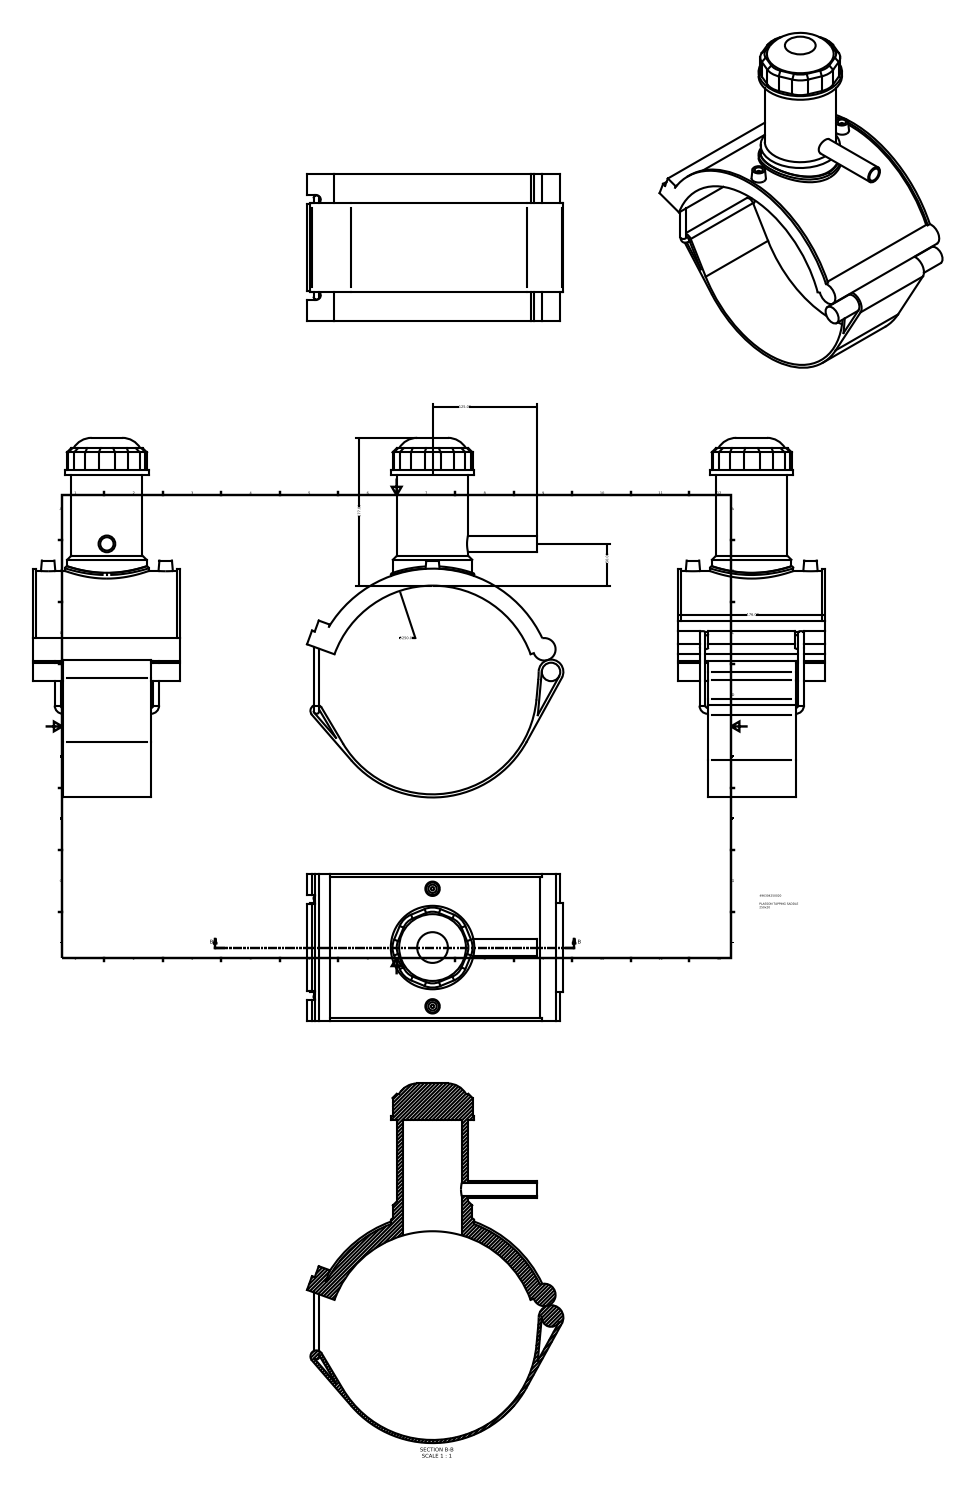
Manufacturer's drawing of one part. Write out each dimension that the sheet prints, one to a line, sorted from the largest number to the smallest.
∅250.00
177.00
176.00
125.00
50.00
